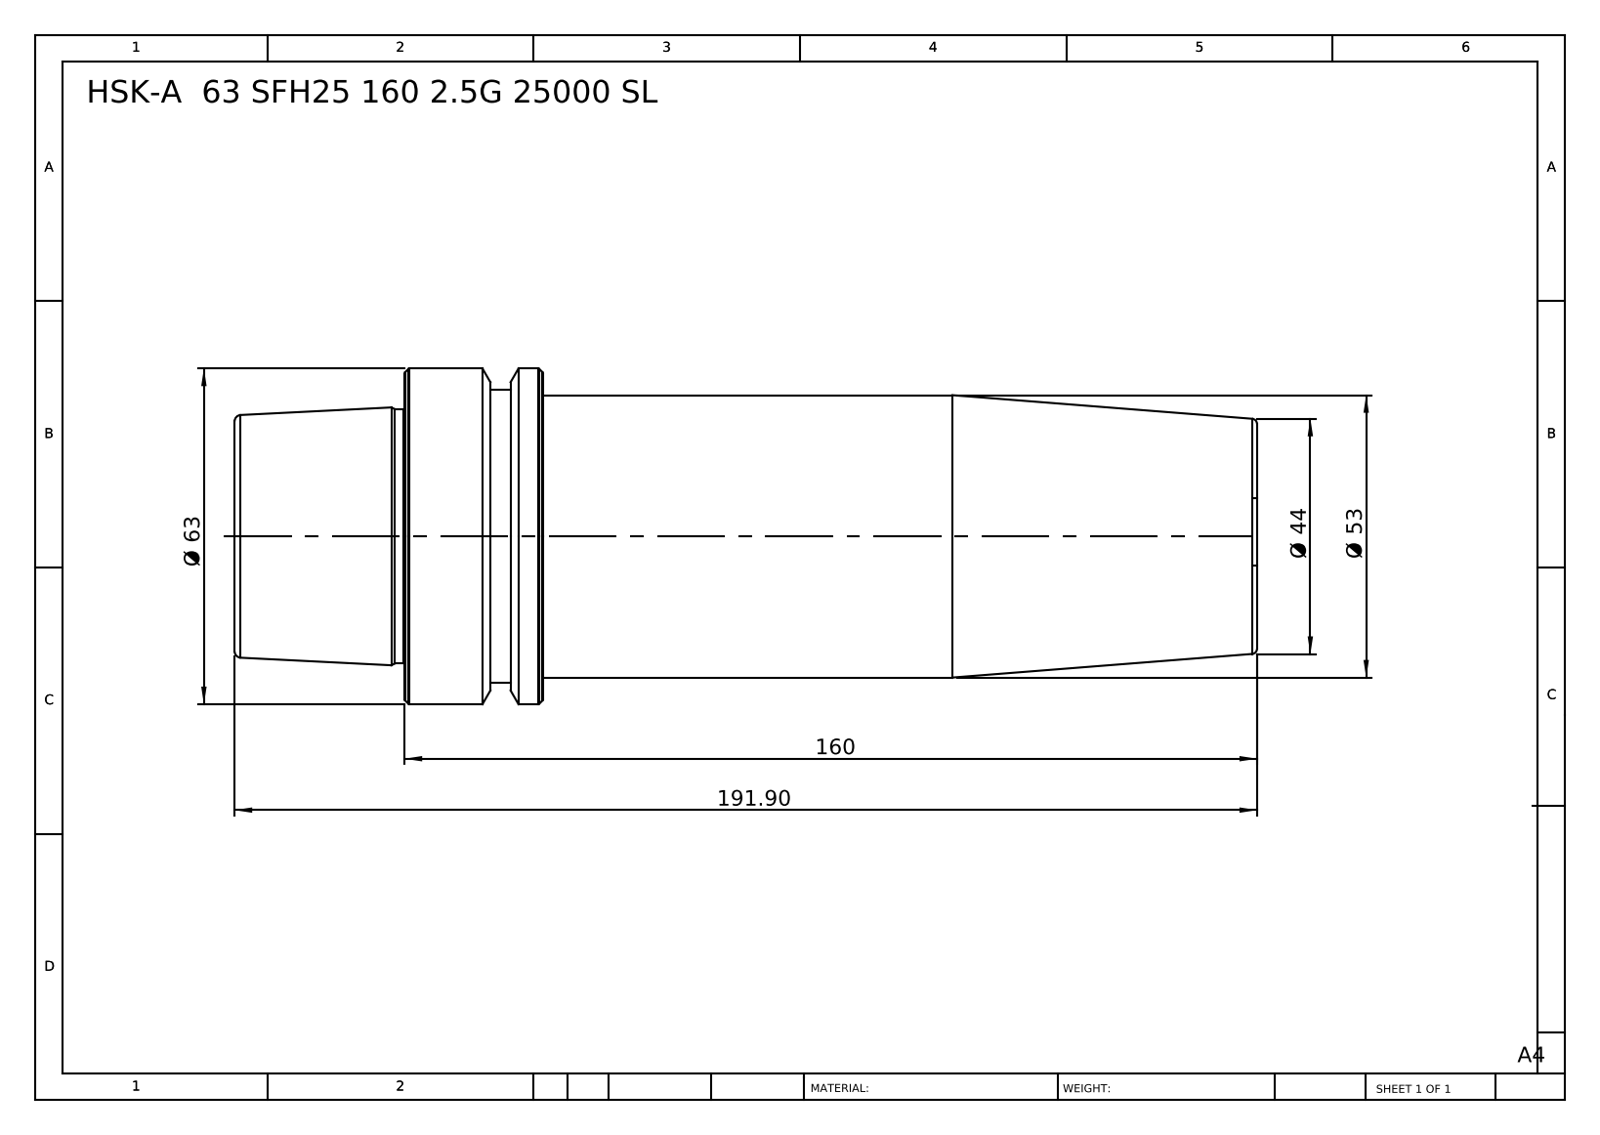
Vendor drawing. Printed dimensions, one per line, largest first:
191.90
160
Ø 63
Ø 53
Ø 44
